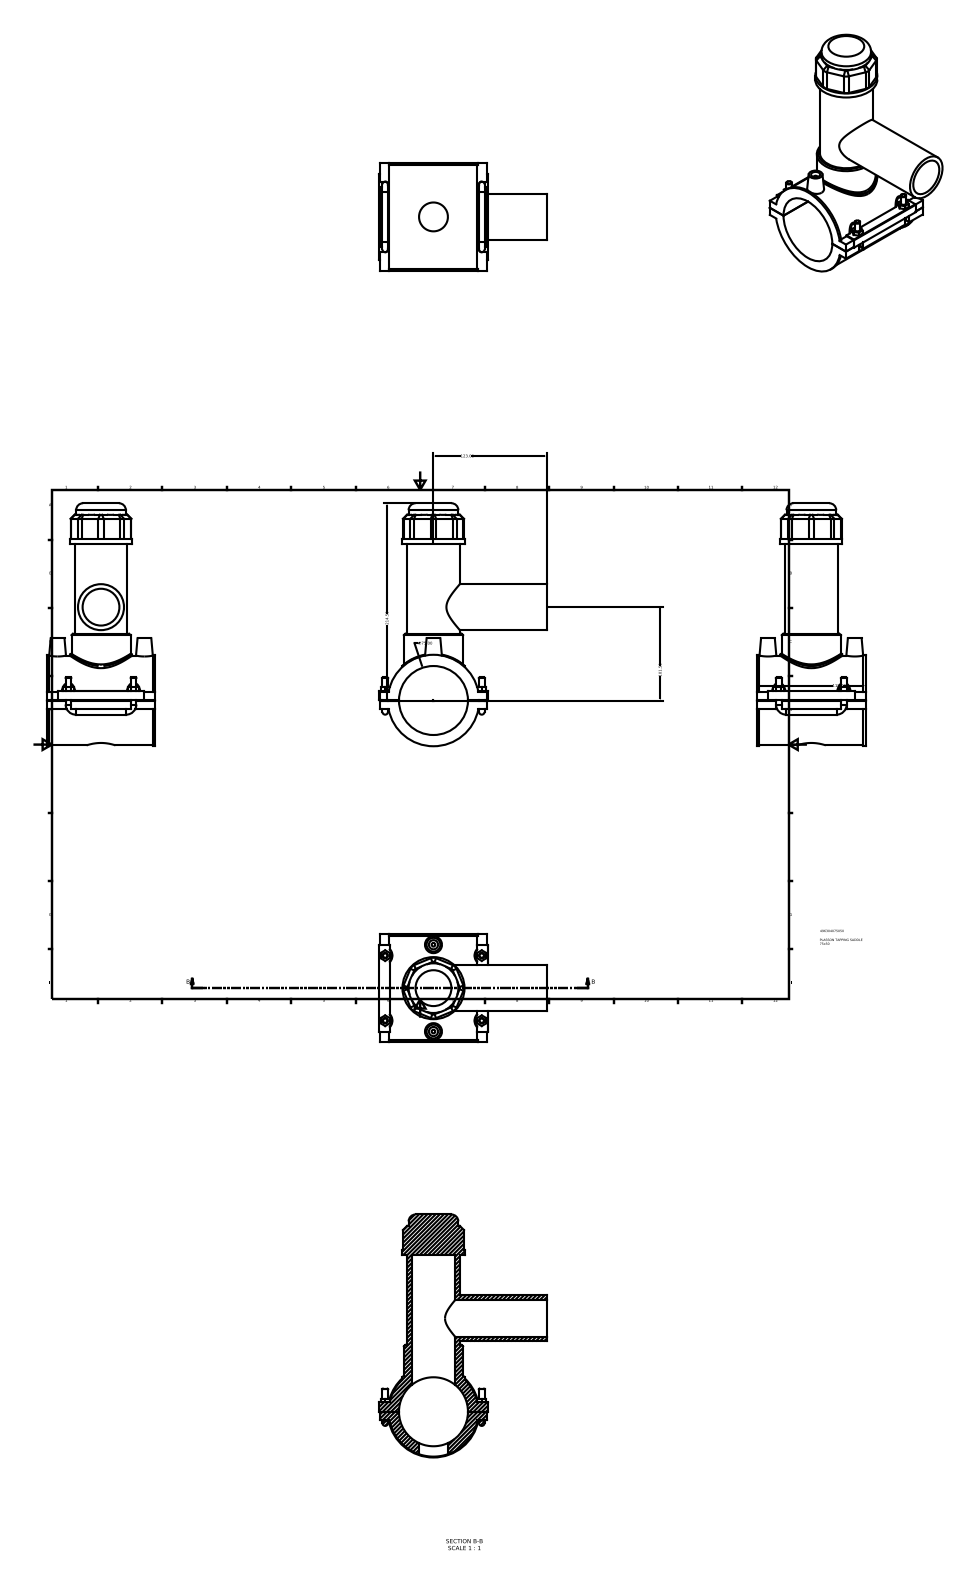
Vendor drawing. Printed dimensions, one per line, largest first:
214.50
123.00
118.00
101.50
∅75.00
